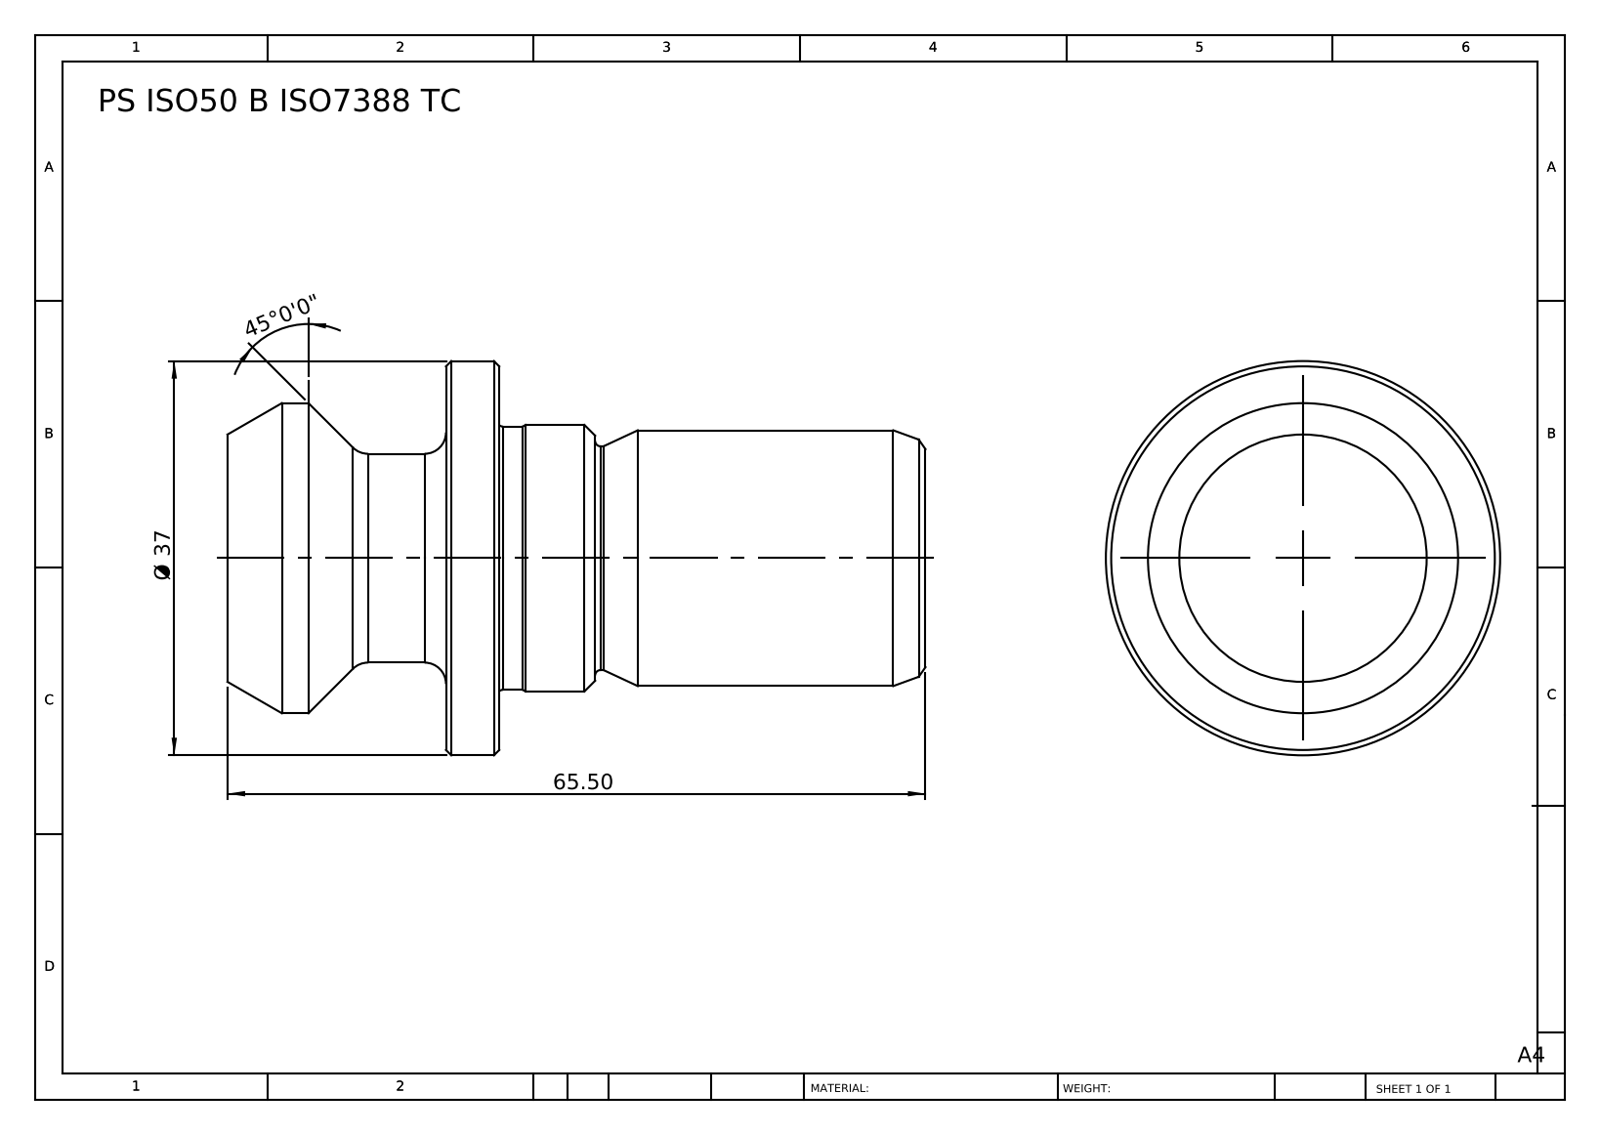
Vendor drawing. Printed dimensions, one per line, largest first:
65.50
45°0'0"
Ø 37
